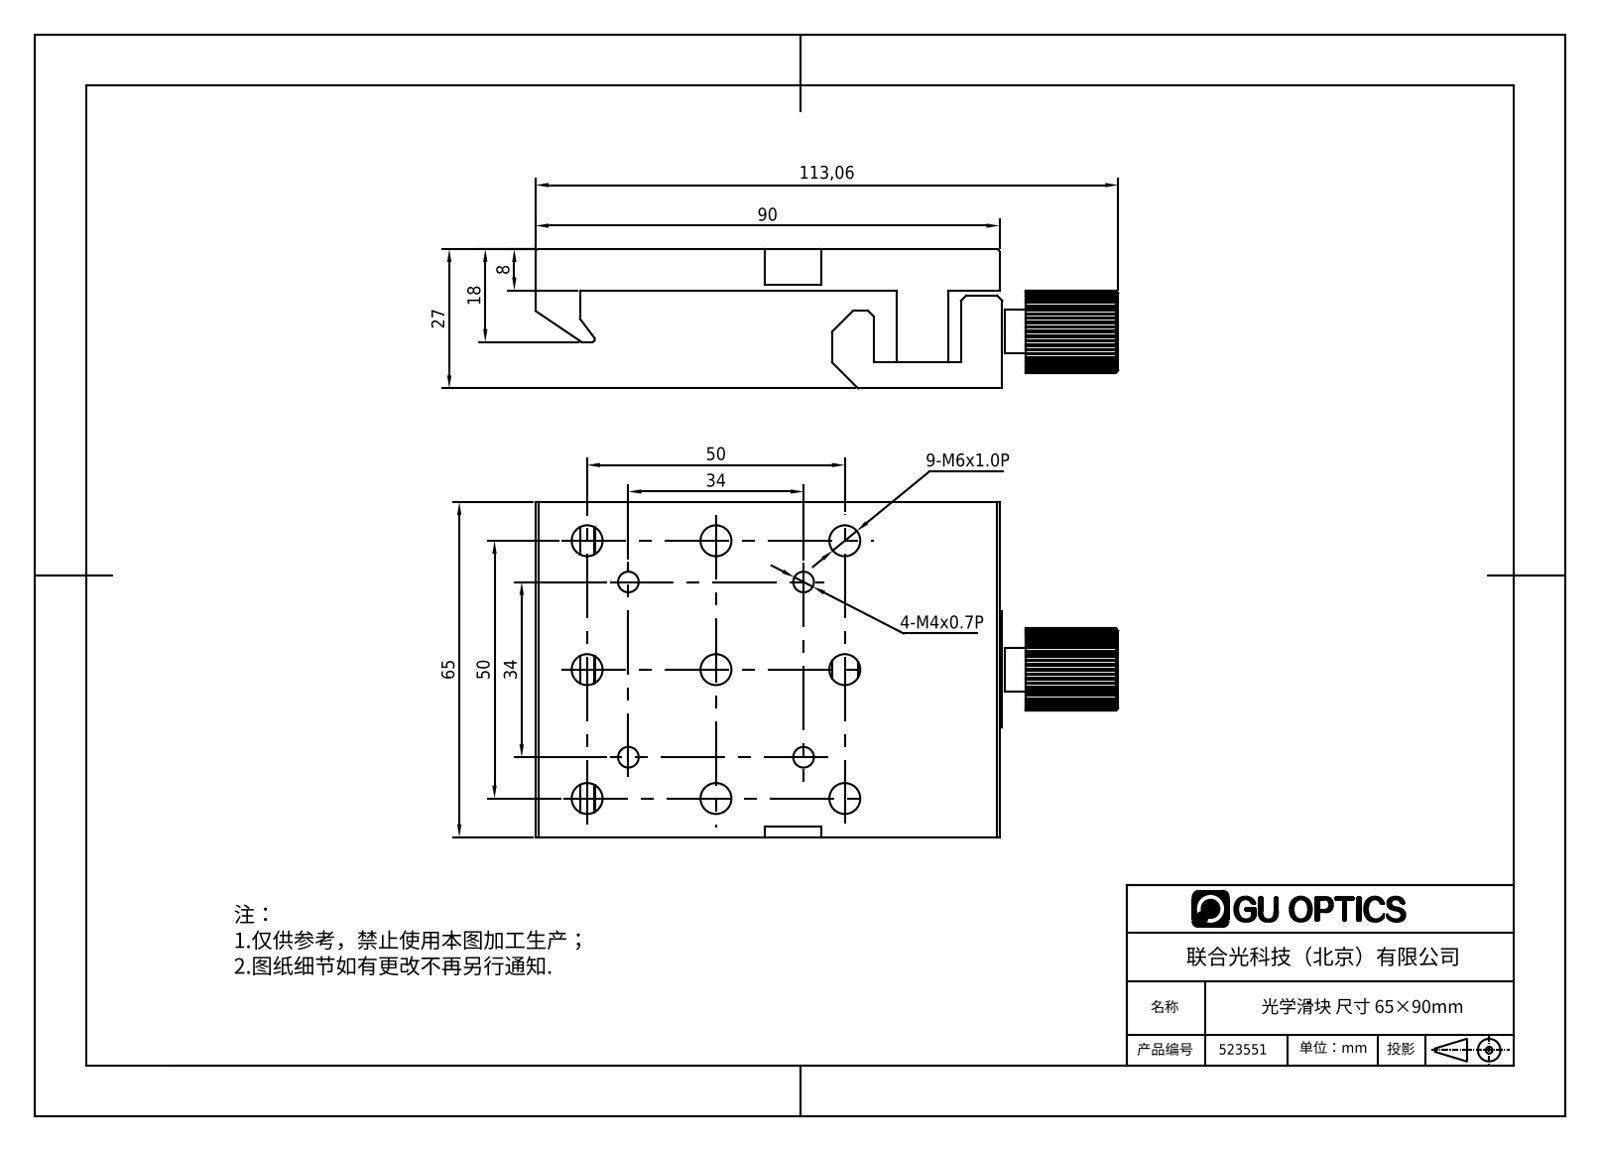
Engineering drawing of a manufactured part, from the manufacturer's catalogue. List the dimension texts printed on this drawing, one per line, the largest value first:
113,06
90
65
50
50
34
34
27
18
8
9-M6x1.0P
4-M4x0.7P
